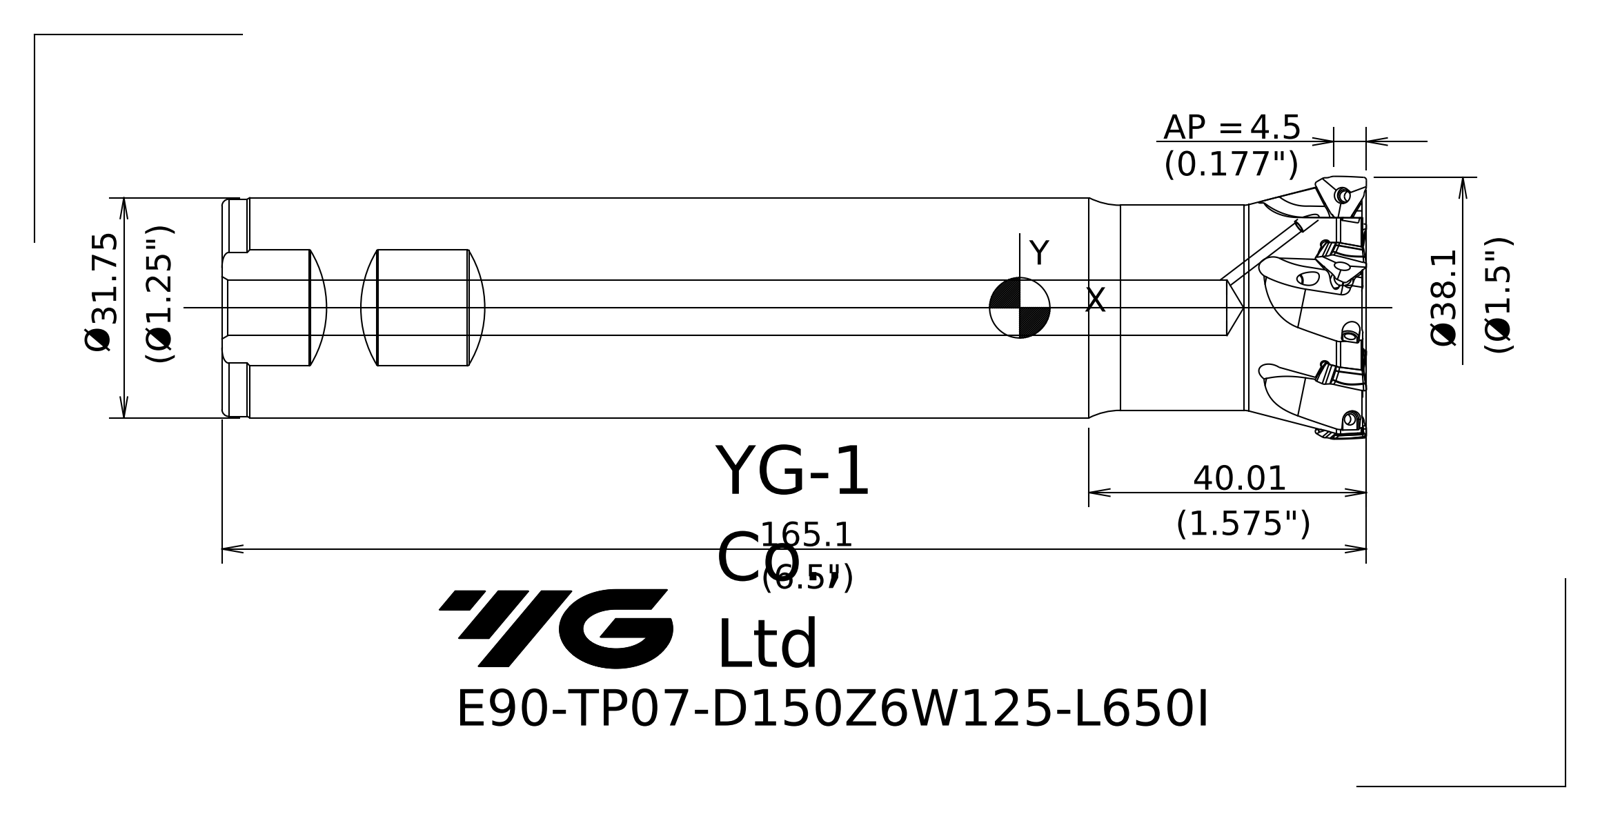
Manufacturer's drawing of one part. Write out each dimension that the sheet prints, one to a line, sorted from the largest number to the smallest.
165.1
40.01
Ø38.1
4.5 AP =
